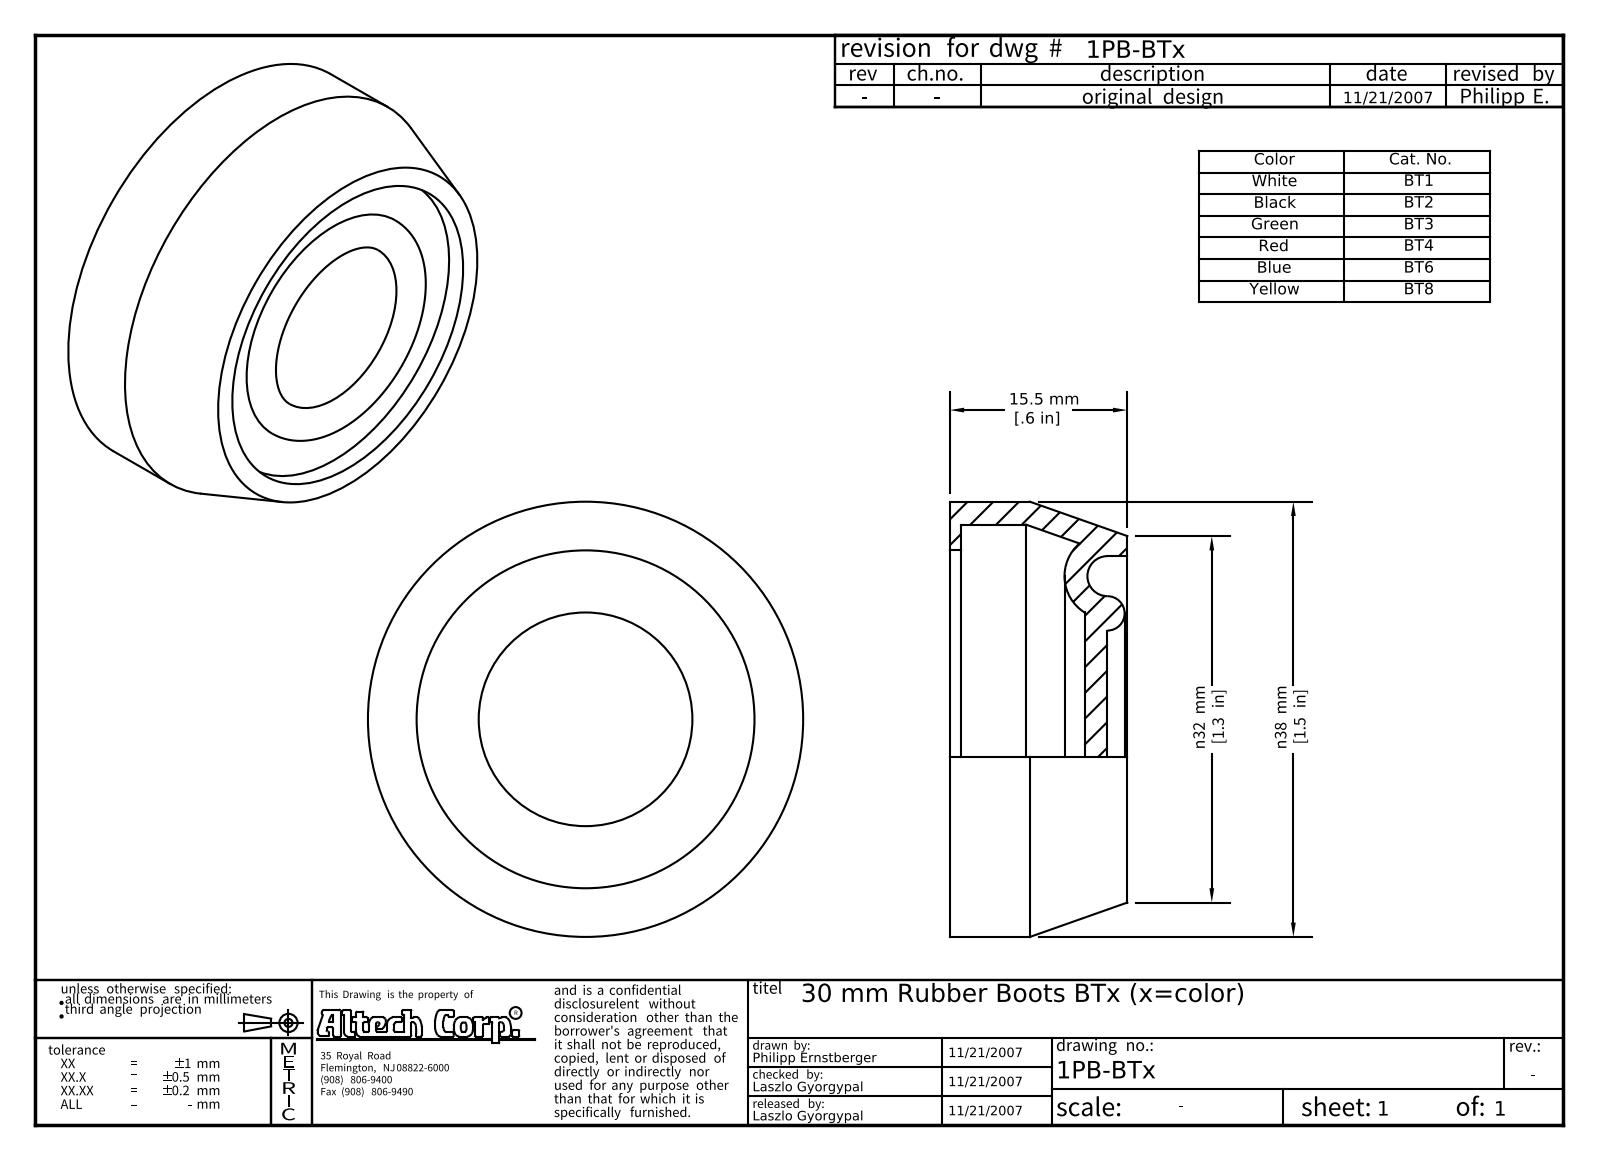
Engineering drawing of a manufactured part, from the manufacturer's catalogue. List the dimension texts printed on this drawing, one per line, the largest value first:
n38 mm [1.5 in]
n32 mm [1.3 in]
15.5 mm [.6 in]
